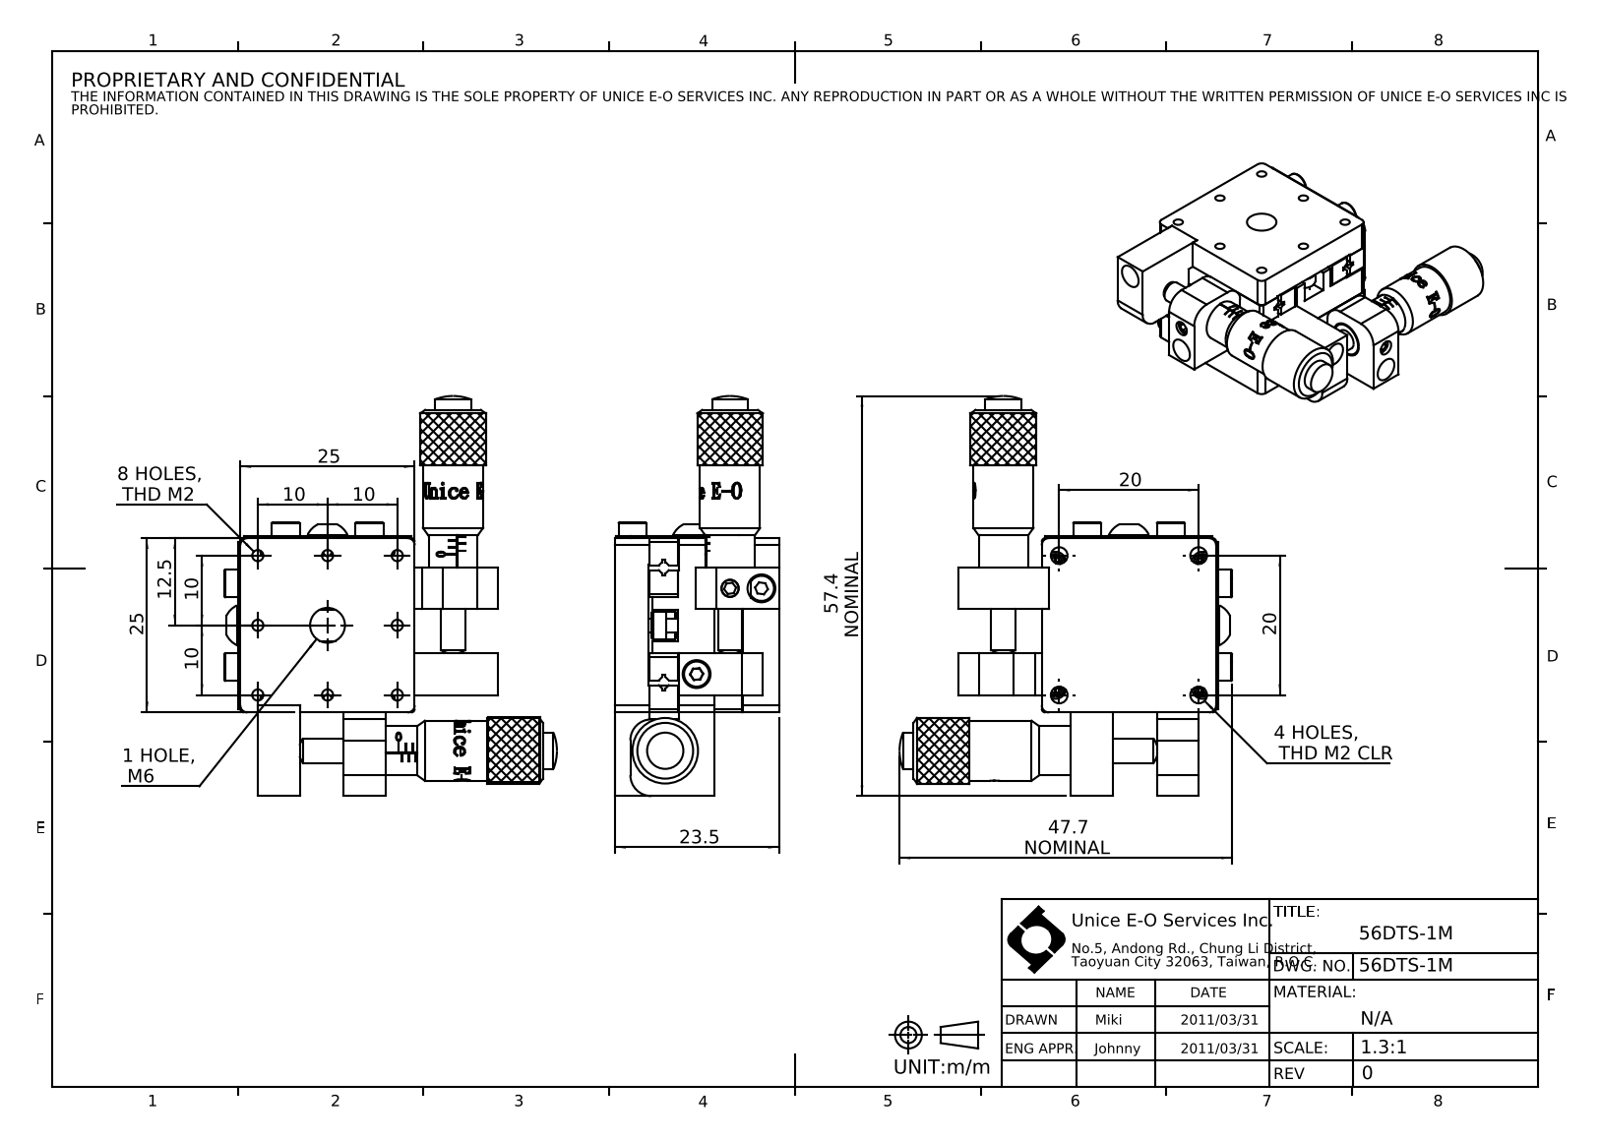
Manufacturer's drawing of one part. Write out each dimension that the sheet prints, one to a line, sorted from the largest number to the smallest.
57.4 NOMINAL
47.7 NOMINAL
25
25
23.5
20
20
12.5
10
10
10
10
8 HOLES, THD M2
4 HOLES, THD M2 CLR
1 HOLE, M6
